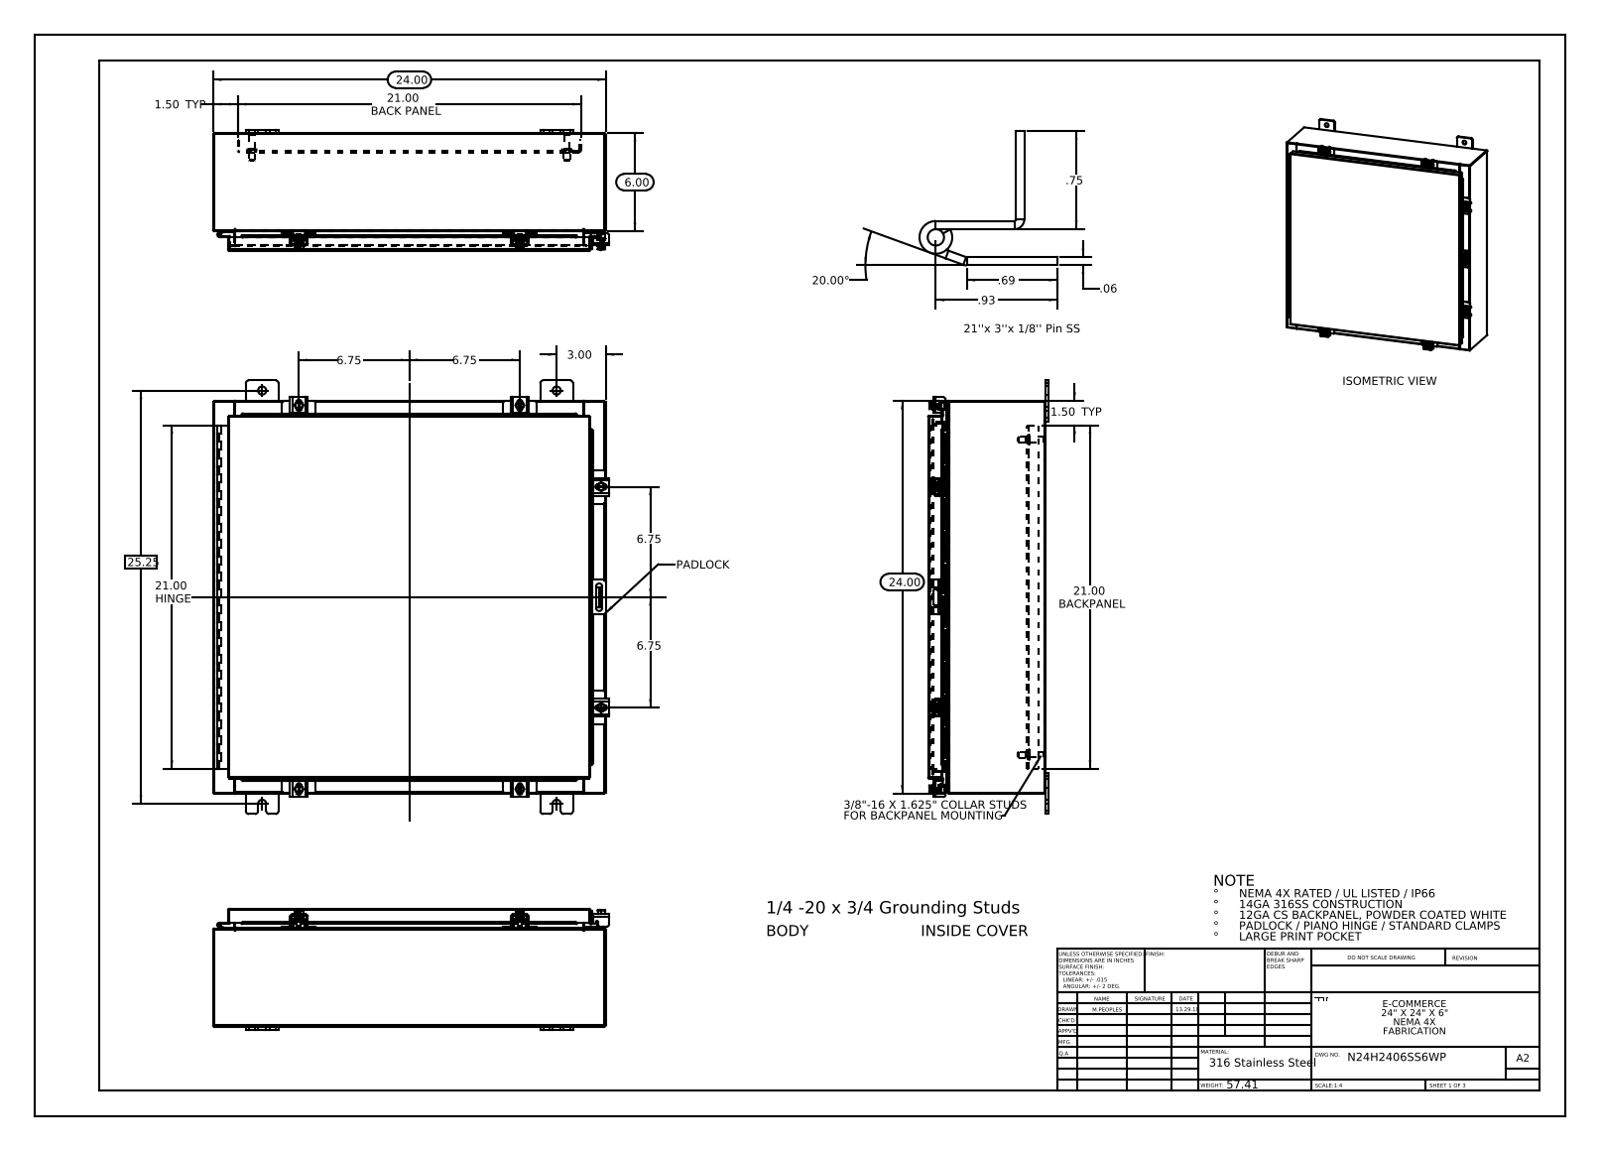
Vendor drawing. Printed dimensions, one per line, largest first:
25.25
24.00
24.00
21.00 HINGE
21.00 BACK PANEL
21.00 BACKPANEL
20.00°
6.75
6.75
6.75
6.75
6.00
3.00
1.50 TYP
1.50 TYP
.93
.75
.69
.06
